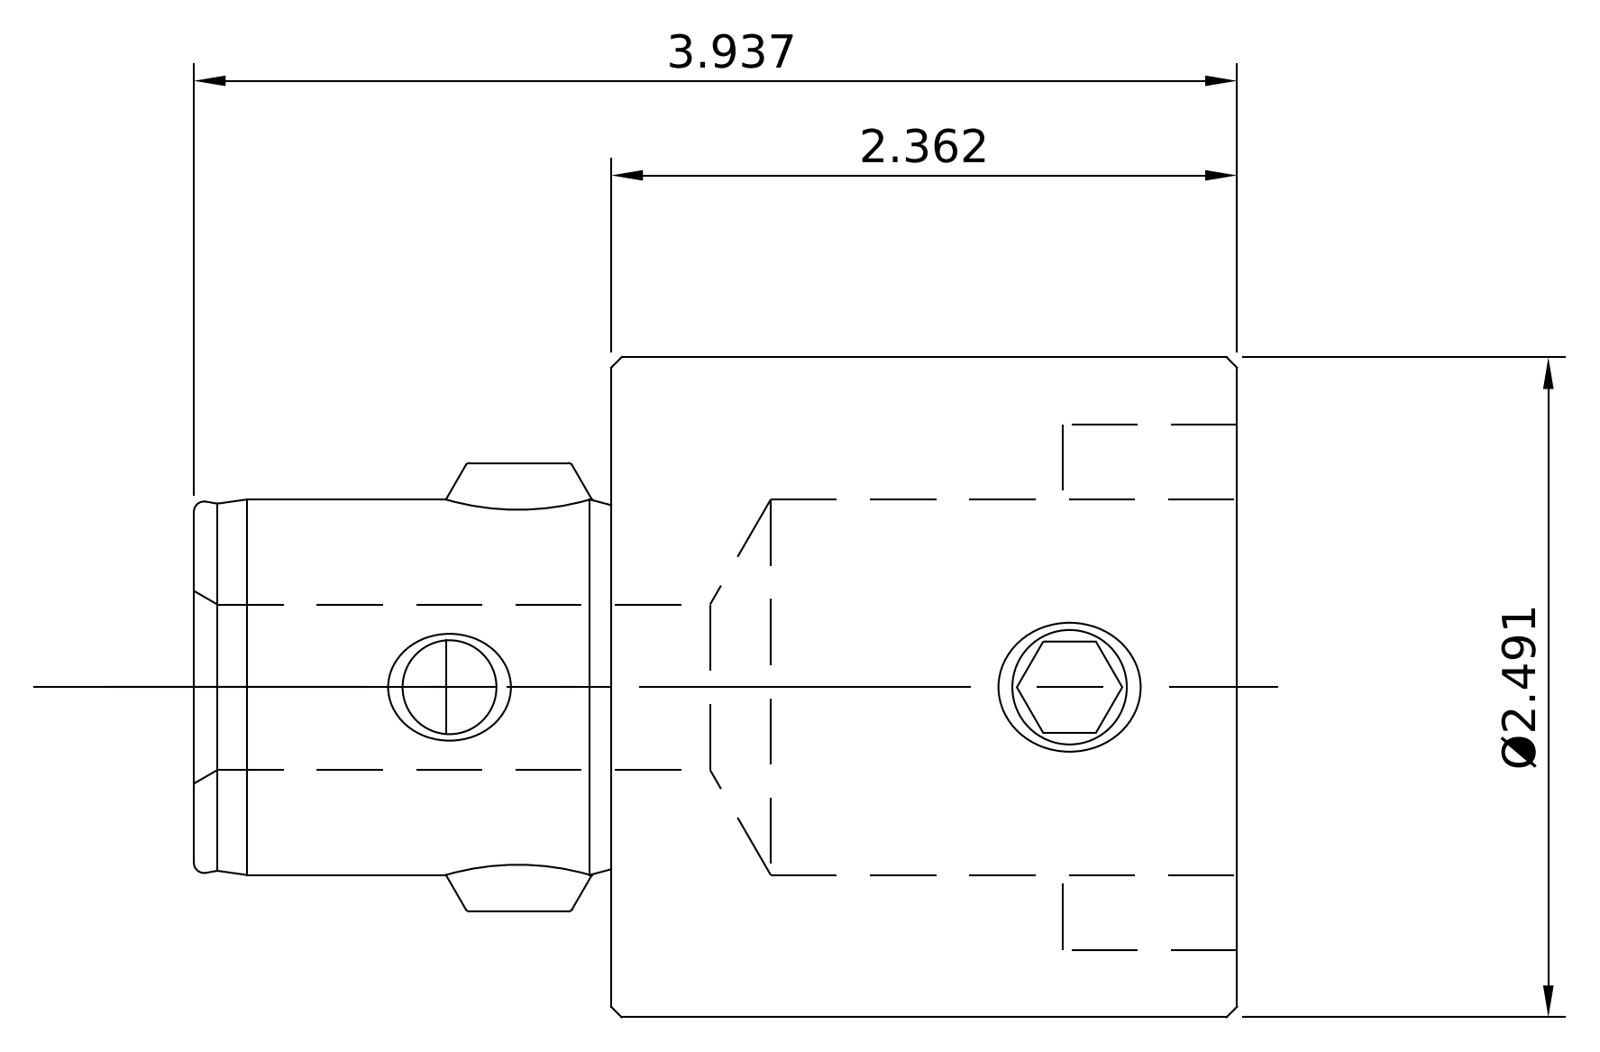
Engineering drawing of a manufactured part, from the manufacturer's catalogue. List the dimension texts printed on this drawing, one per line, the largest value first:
3.937
Ø2.491
2.362
